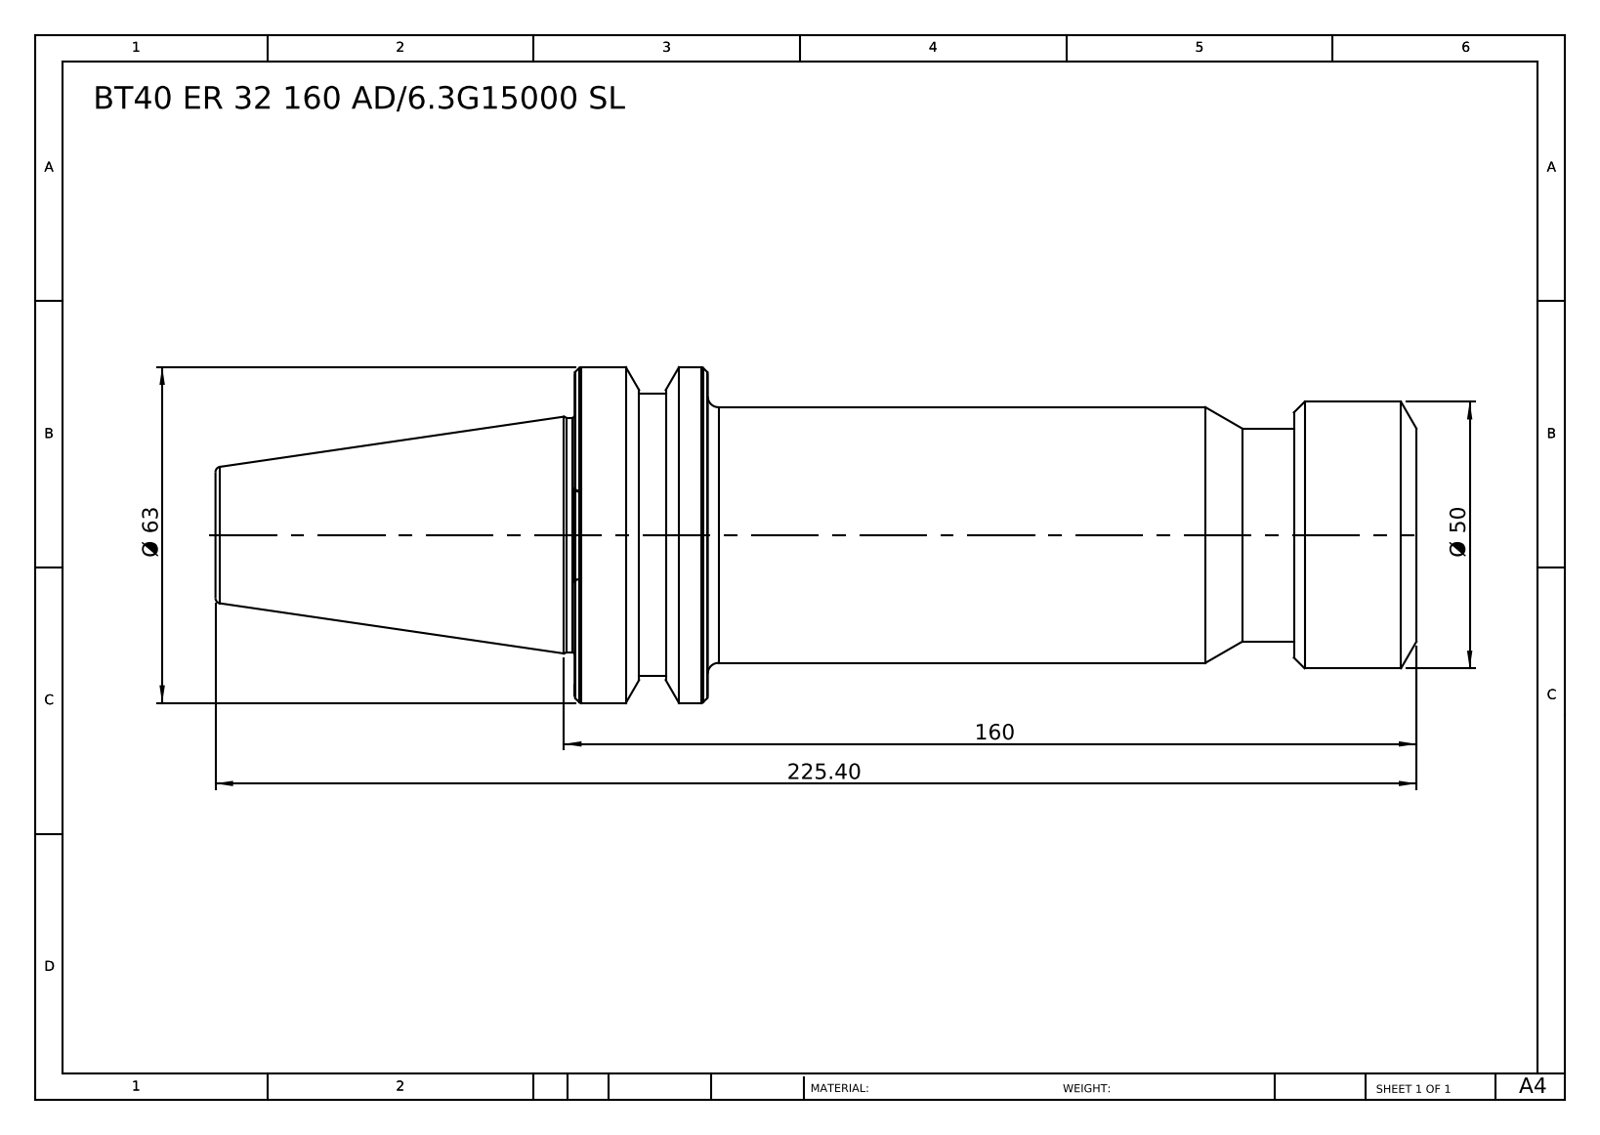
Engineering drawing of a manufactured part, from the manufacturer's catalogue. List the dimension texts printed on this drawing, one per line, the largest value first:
225.40
160
Ø 63
Ø 50
